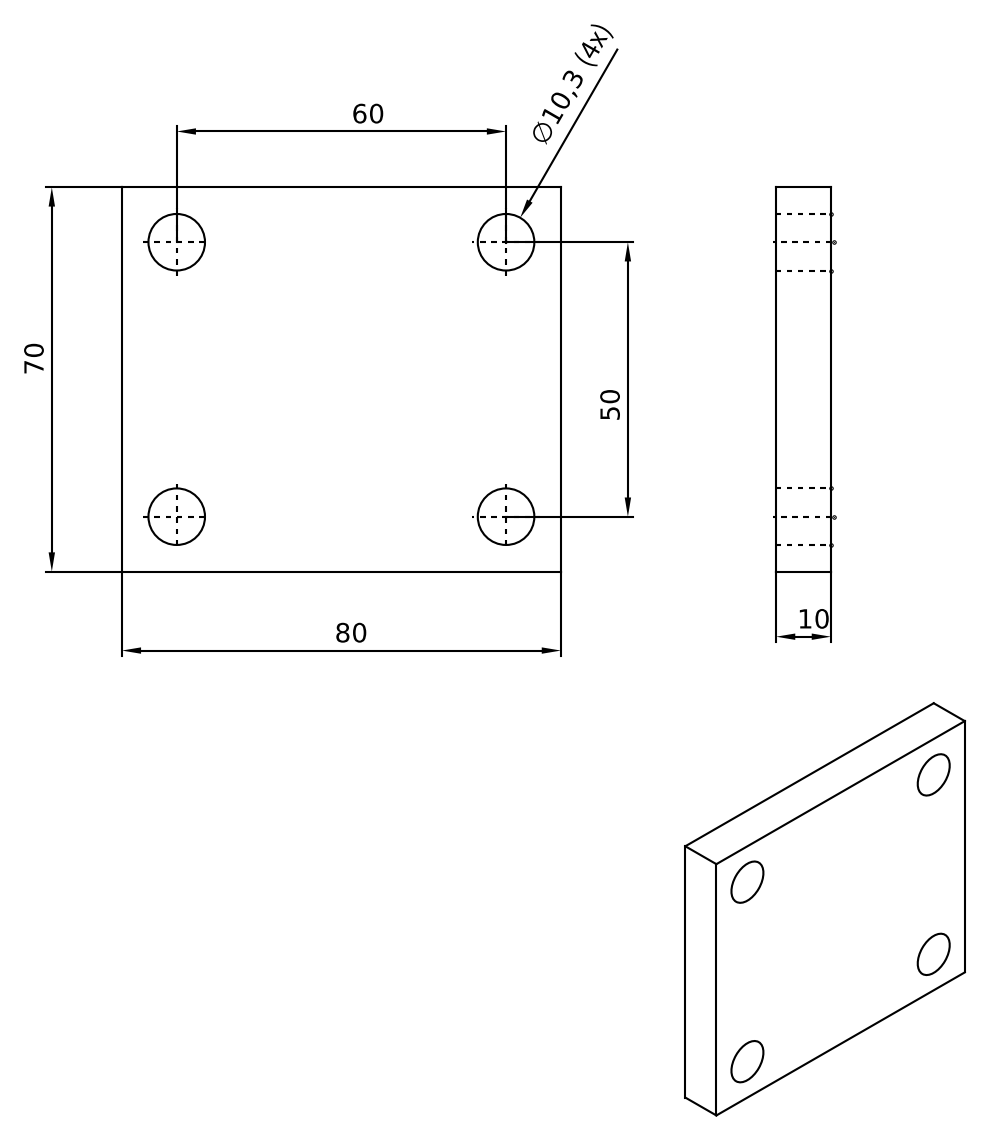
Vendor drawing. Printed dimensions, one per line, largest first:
80
70
60
50
10
(4x)
